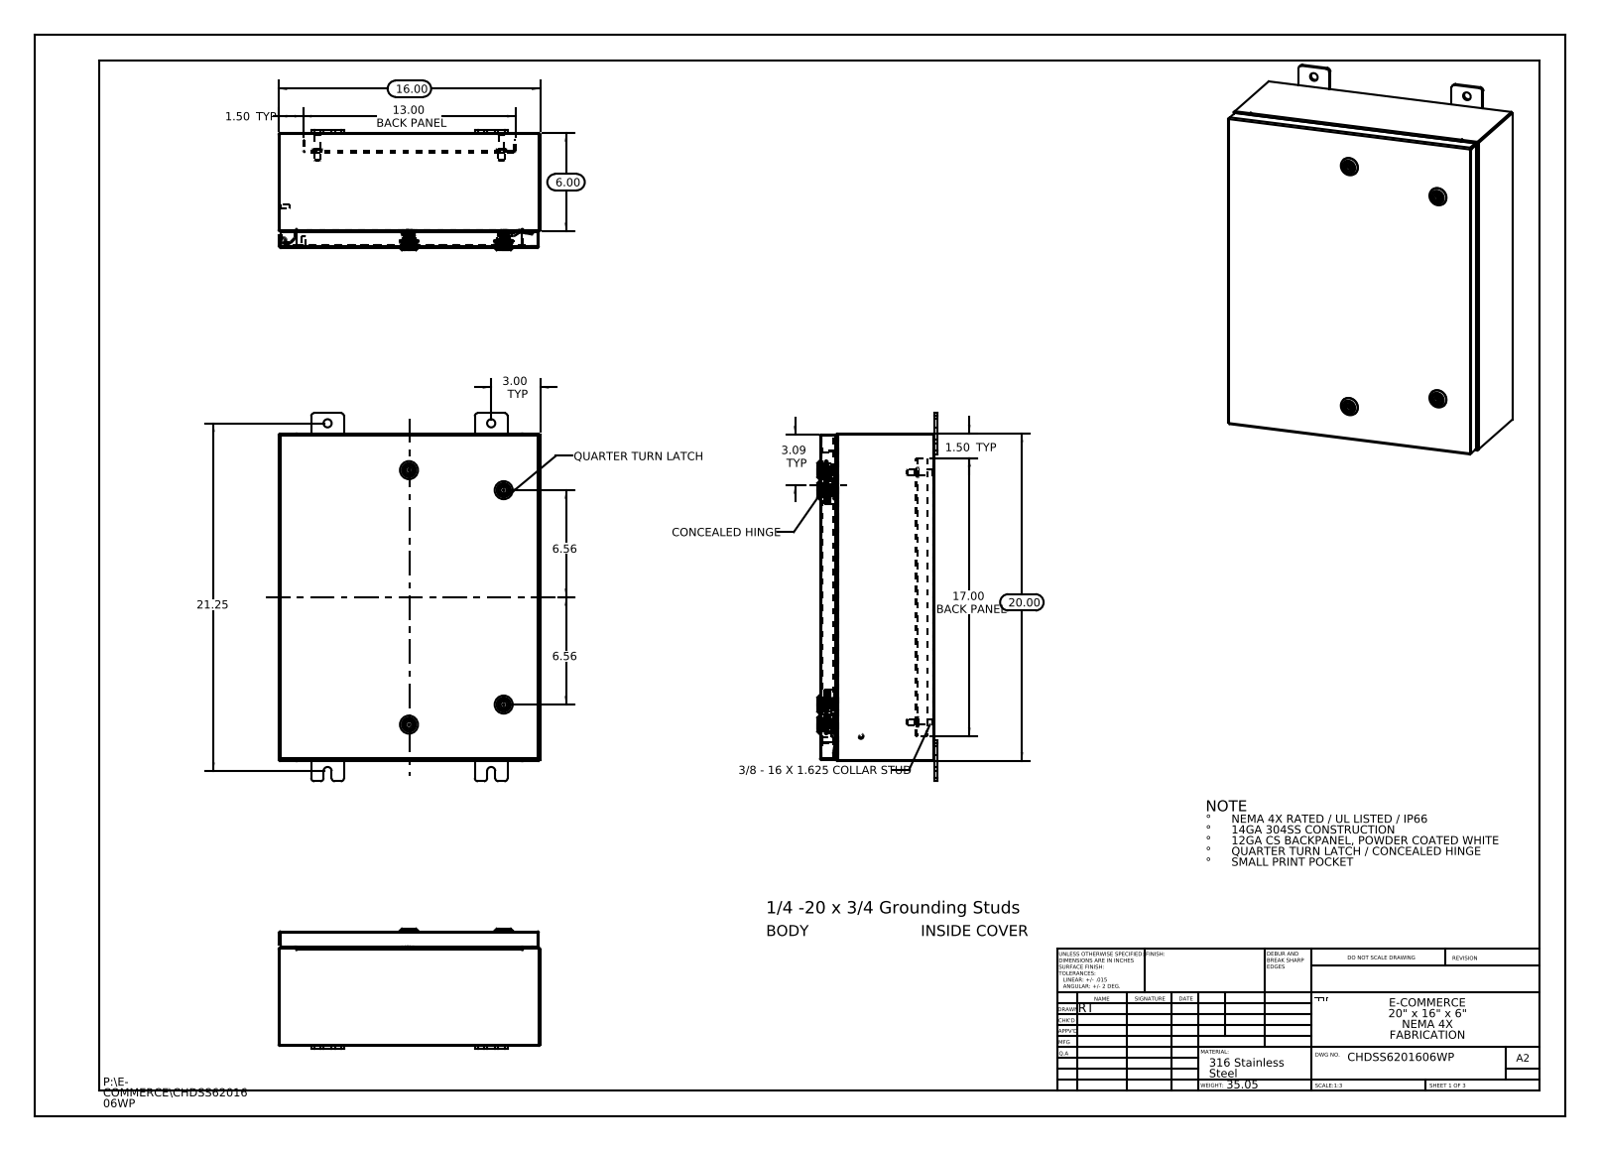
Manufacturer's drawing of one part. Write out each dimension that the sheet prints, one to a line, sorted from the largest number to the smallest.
21.25
20.00
17.00 BACK PANEL
16.00
13.00 BACK PANEL
6.56
6.56
6.00
3.09 TYP
3.00 TYP
1.50 TYP
1.50 TYP
